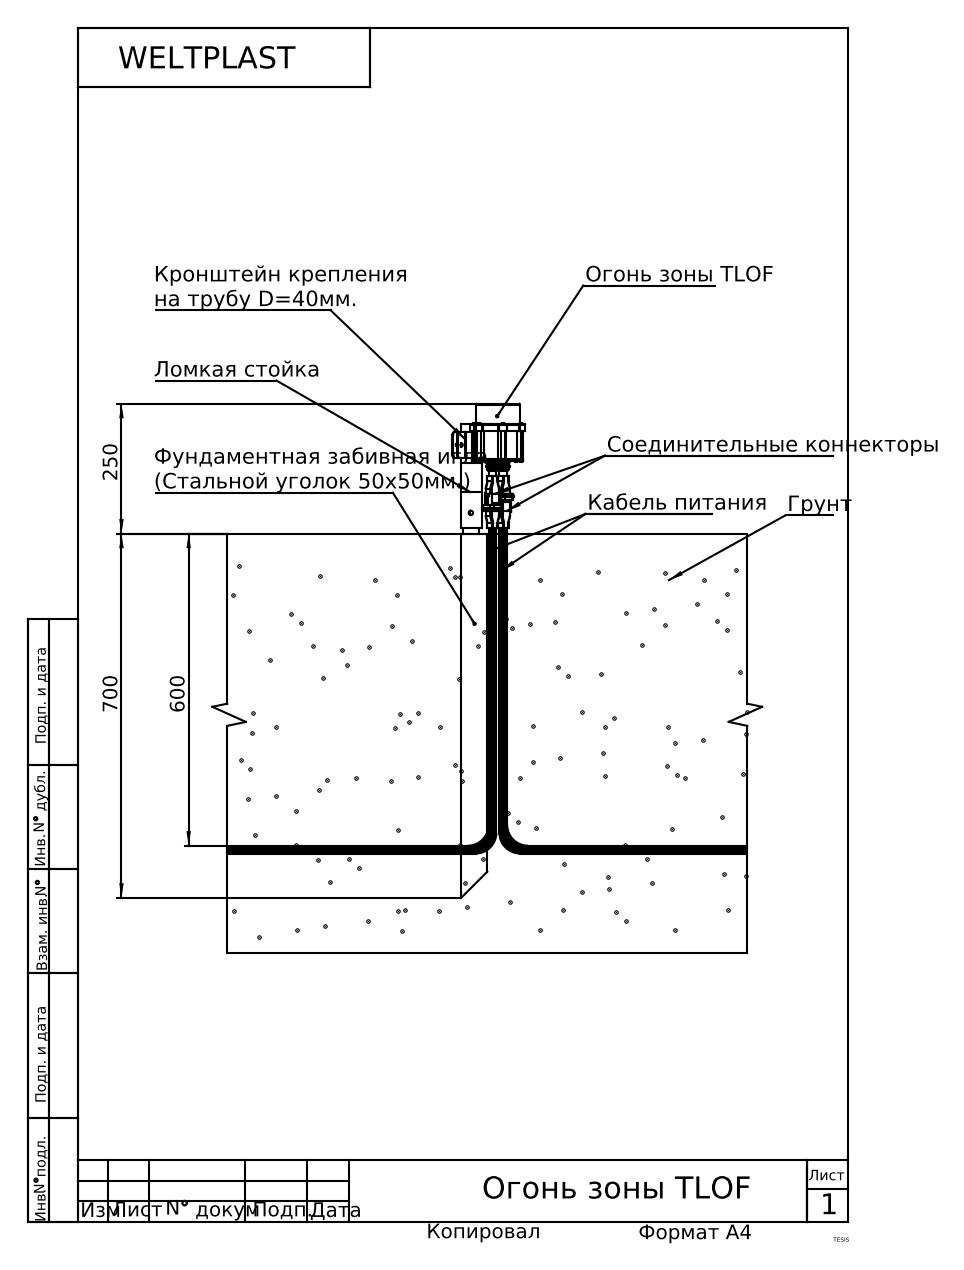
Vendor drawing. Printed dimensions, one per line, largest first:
700
600
250
